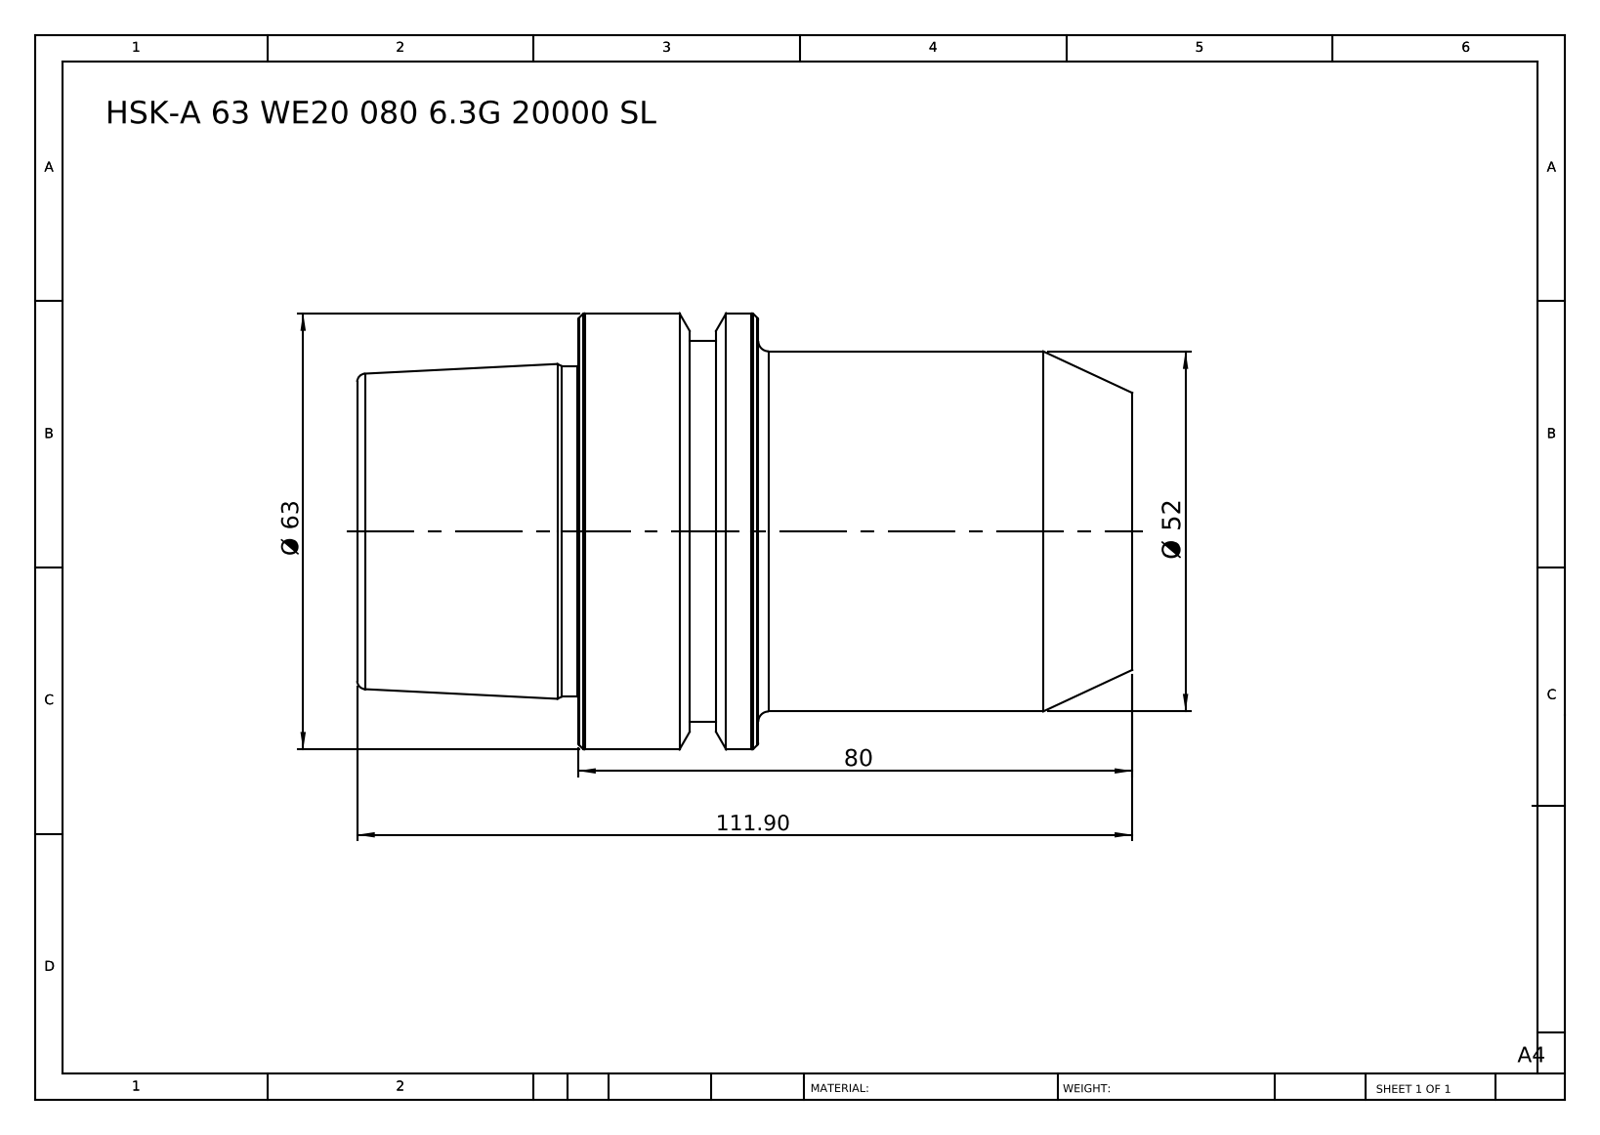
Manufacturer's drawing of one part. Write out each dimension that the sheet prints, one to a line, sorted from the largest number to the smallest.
111.90
80
Ø 63
Ø 52
